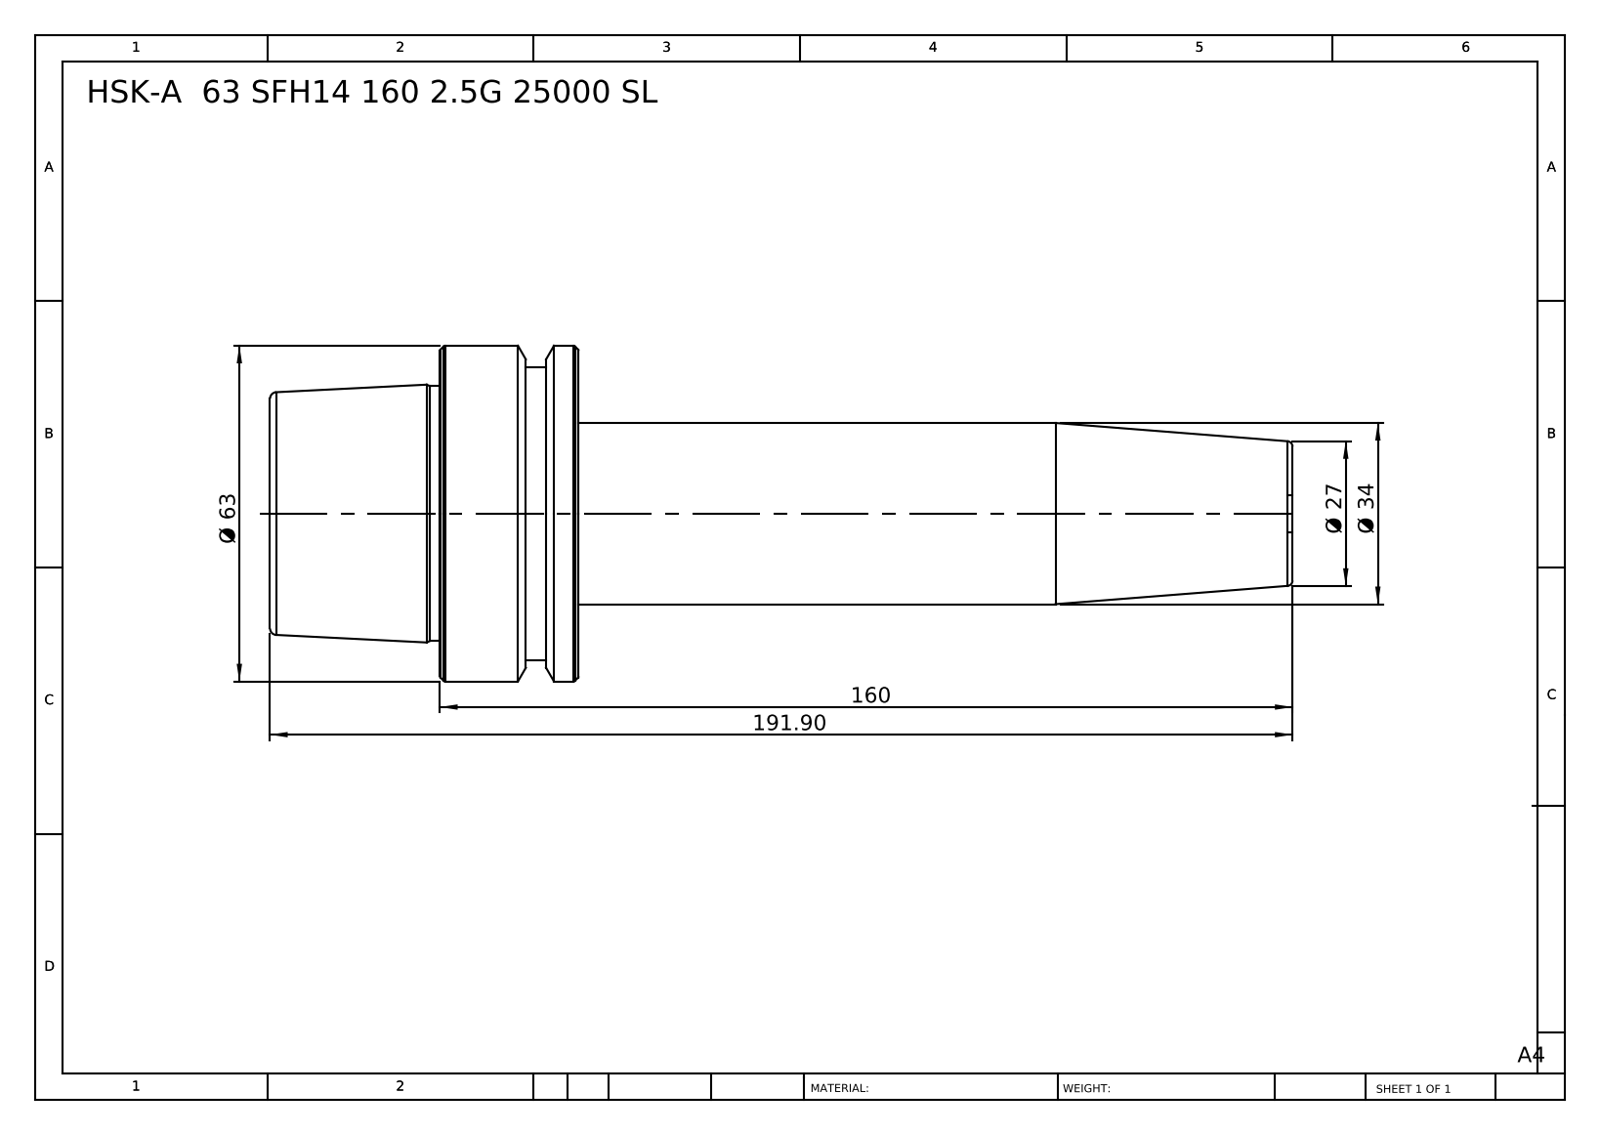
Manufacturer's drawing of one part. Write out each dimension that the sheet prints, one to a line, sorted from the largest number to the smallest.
191.90
160
Ø 63
Ø 34
Ø 27
